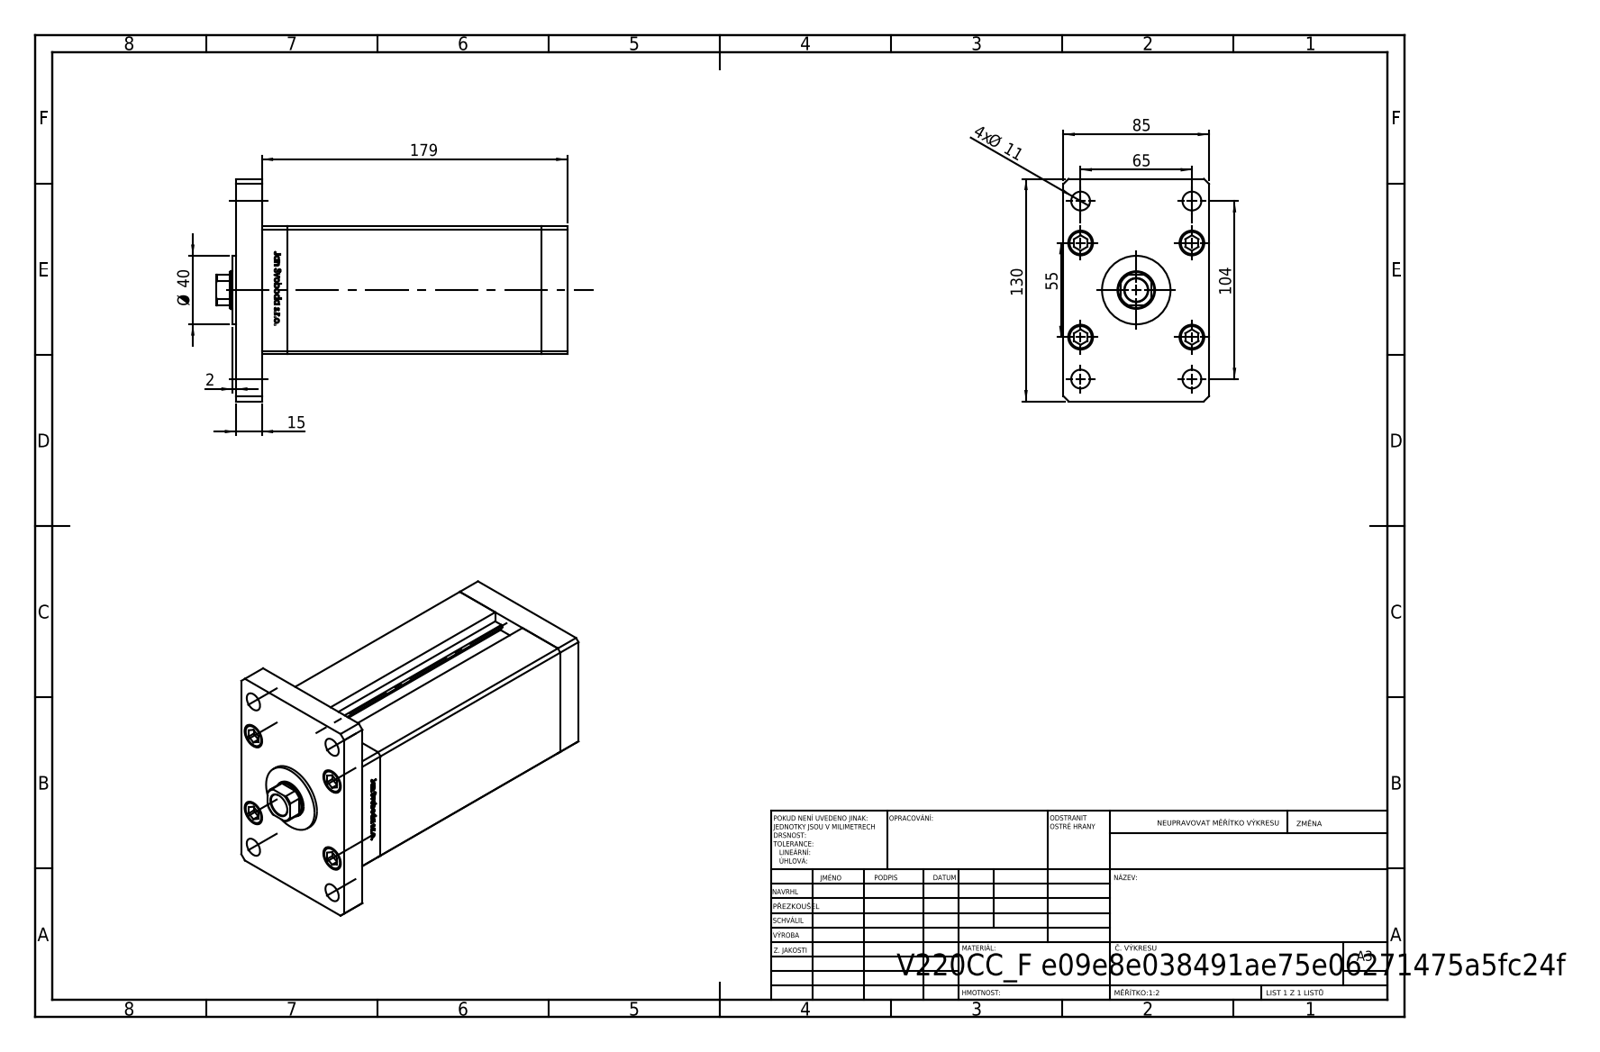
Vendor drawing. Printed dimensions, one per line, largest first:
179
130
104
85
65
55
Ø 40
15
4x Ø 11
2
